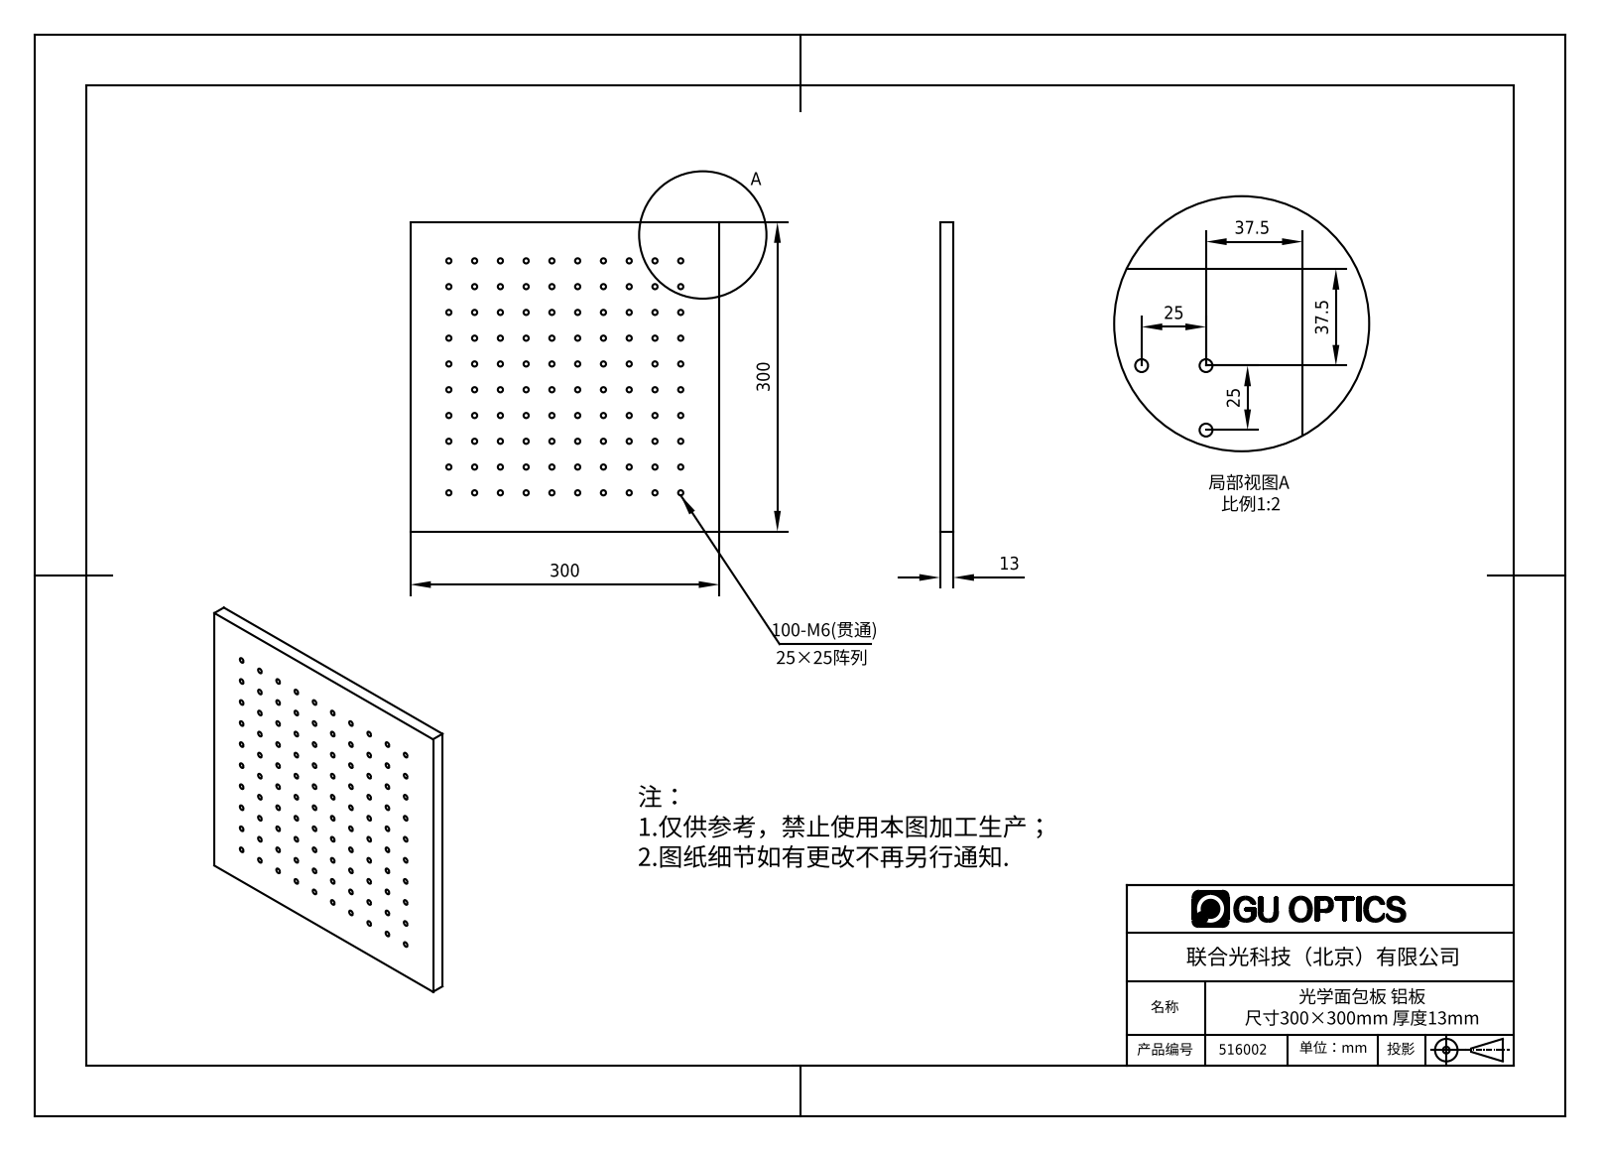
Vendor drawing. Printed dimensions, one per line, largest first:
300
300
37.5
37.5
25
25
13
